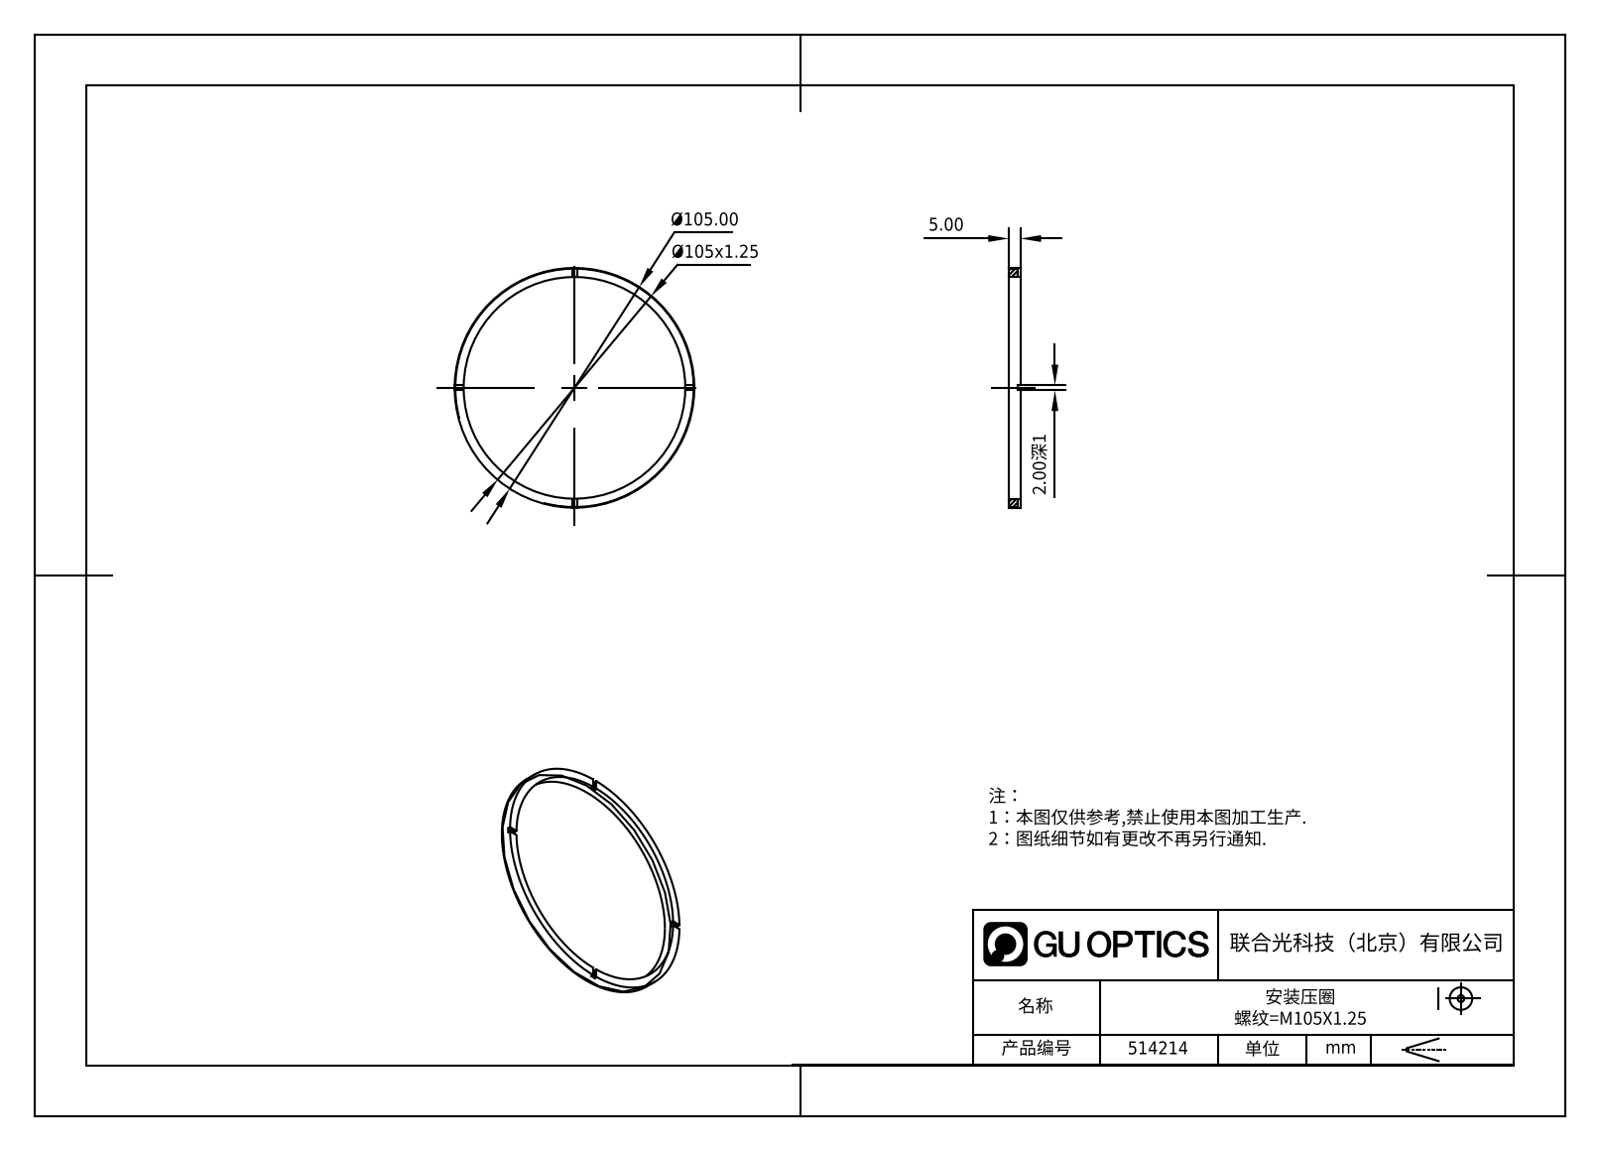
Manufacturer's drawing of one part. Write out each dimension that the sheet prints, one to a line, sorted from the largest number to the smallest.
Ø105.00
Ø105x1.25
5.00
2.00深1
